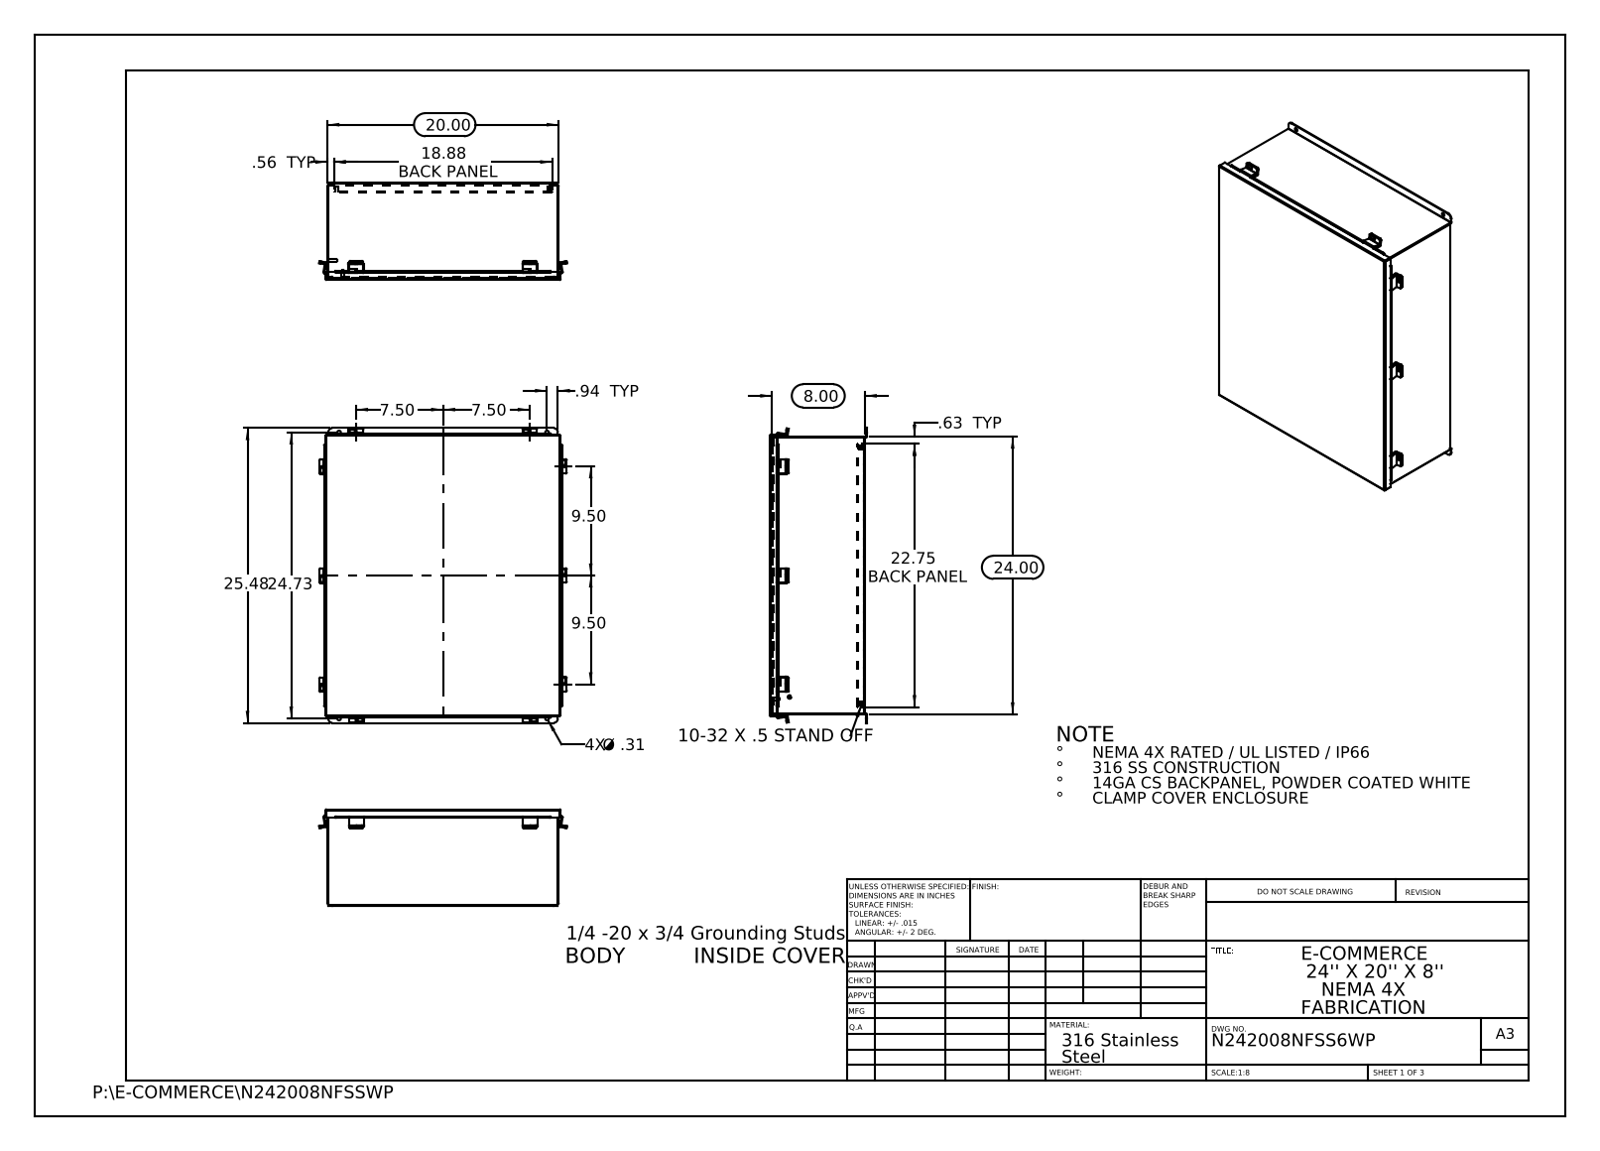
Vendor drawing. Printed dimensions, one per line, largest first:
25.48
24.73
24.00
22.75 BACK PANEL
20.00
18.88 BACK PANEL
9.50
9.50
8.00
7.50
7.50
.94 TYP
.63 TYP
.56 TYP
4X Ø .31
